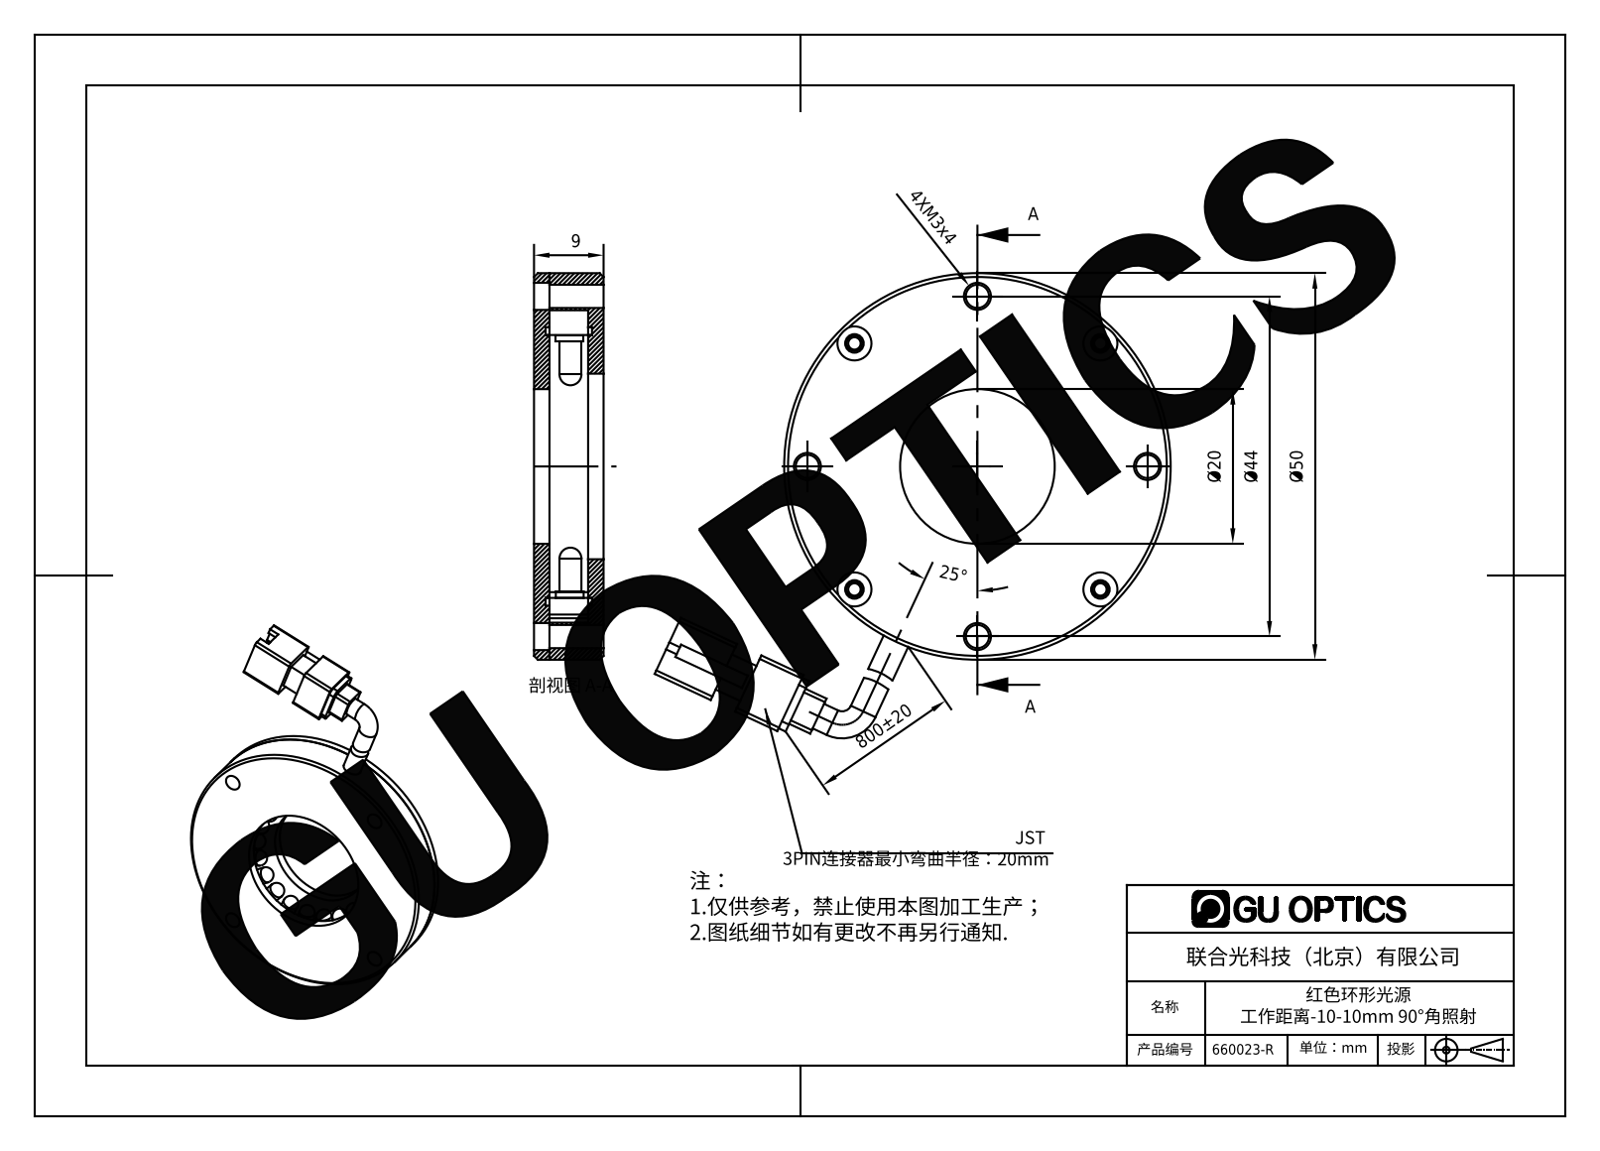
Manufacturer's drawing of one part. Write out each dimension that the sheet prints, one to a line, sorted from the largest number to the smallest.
800±20
Ø50
Ø44
25°
Ø20
9
4XM3x4
